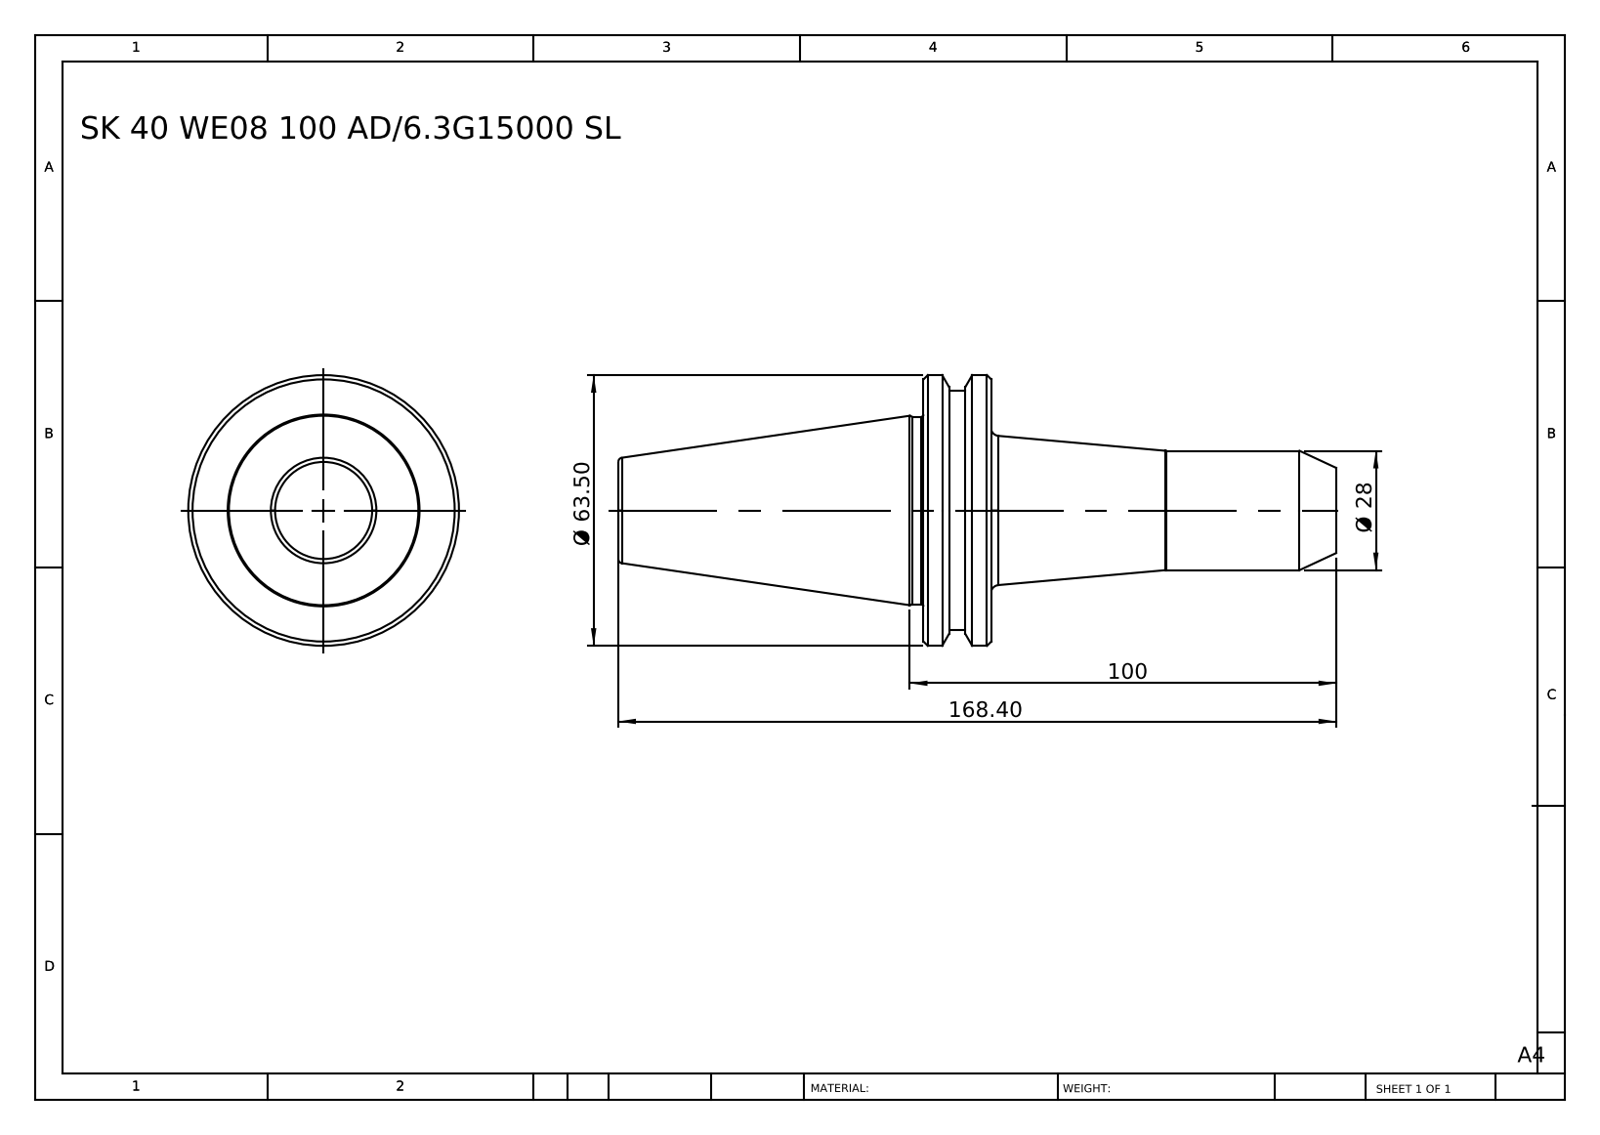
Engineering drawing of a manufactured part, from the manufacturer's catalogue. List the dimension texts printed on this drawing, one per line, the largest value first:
168.40
100
Ø 63.50
Ø 28
